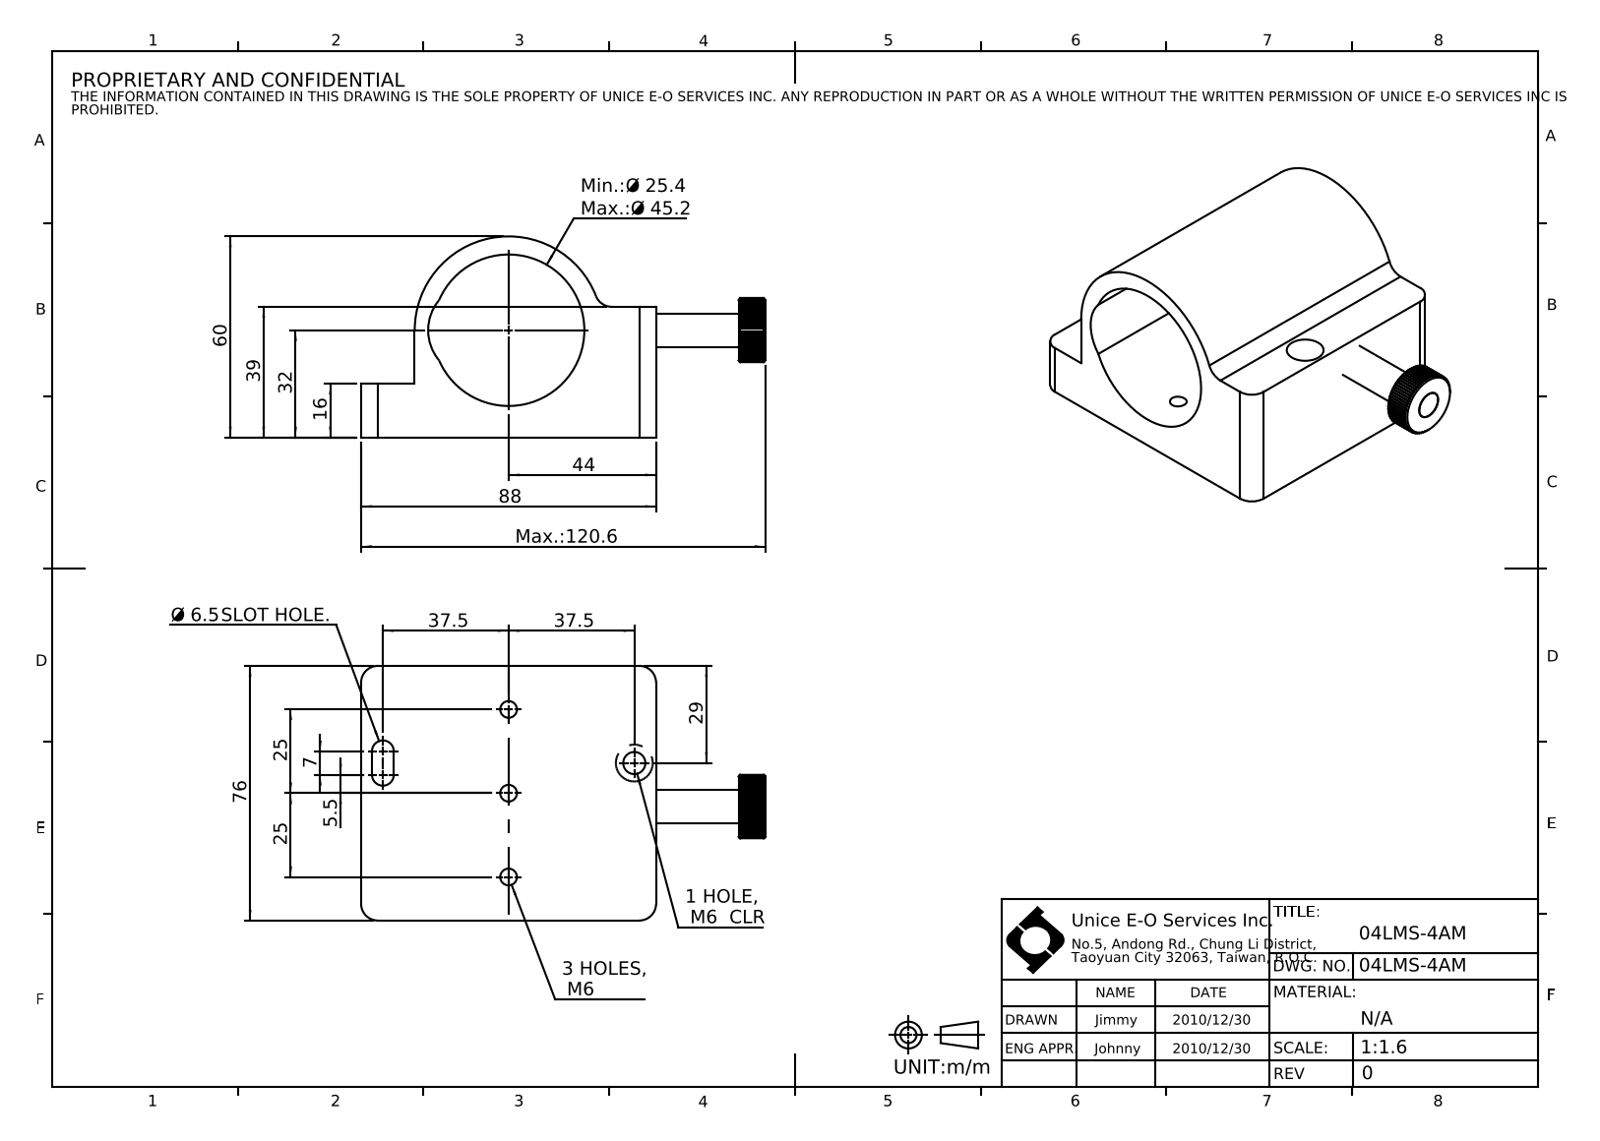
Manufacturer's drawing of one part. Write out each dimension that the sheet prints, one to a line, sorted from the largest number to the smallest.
Max.: 120.6
88
76
60
44
39
37.5
37.5
32
29
Min.: Ø 25.4 Max.: Ø 45.2
25
25
16
7
Ø 6.5 SLOT HOLE.
5.5
3 HOLES, M6
1 HOLE, M6 CLR
